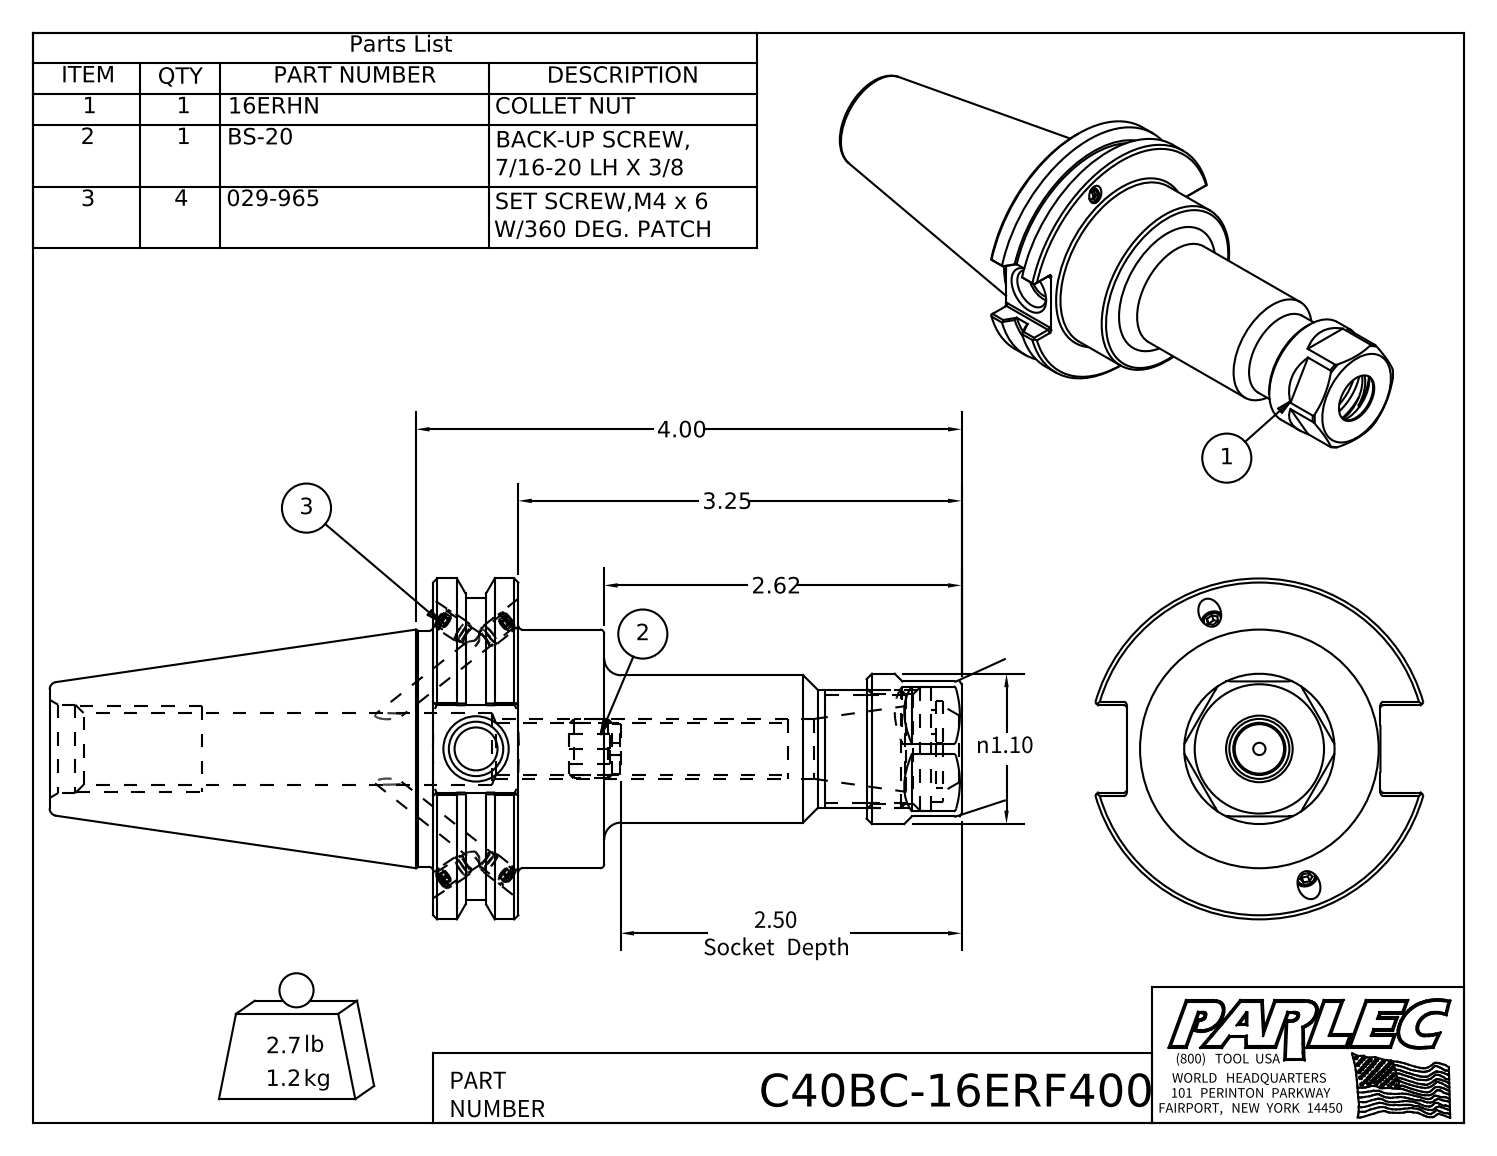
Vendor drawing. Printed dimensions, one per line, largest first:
4.00
3.25
2.62
2.50 Socket Depth
n1.10
